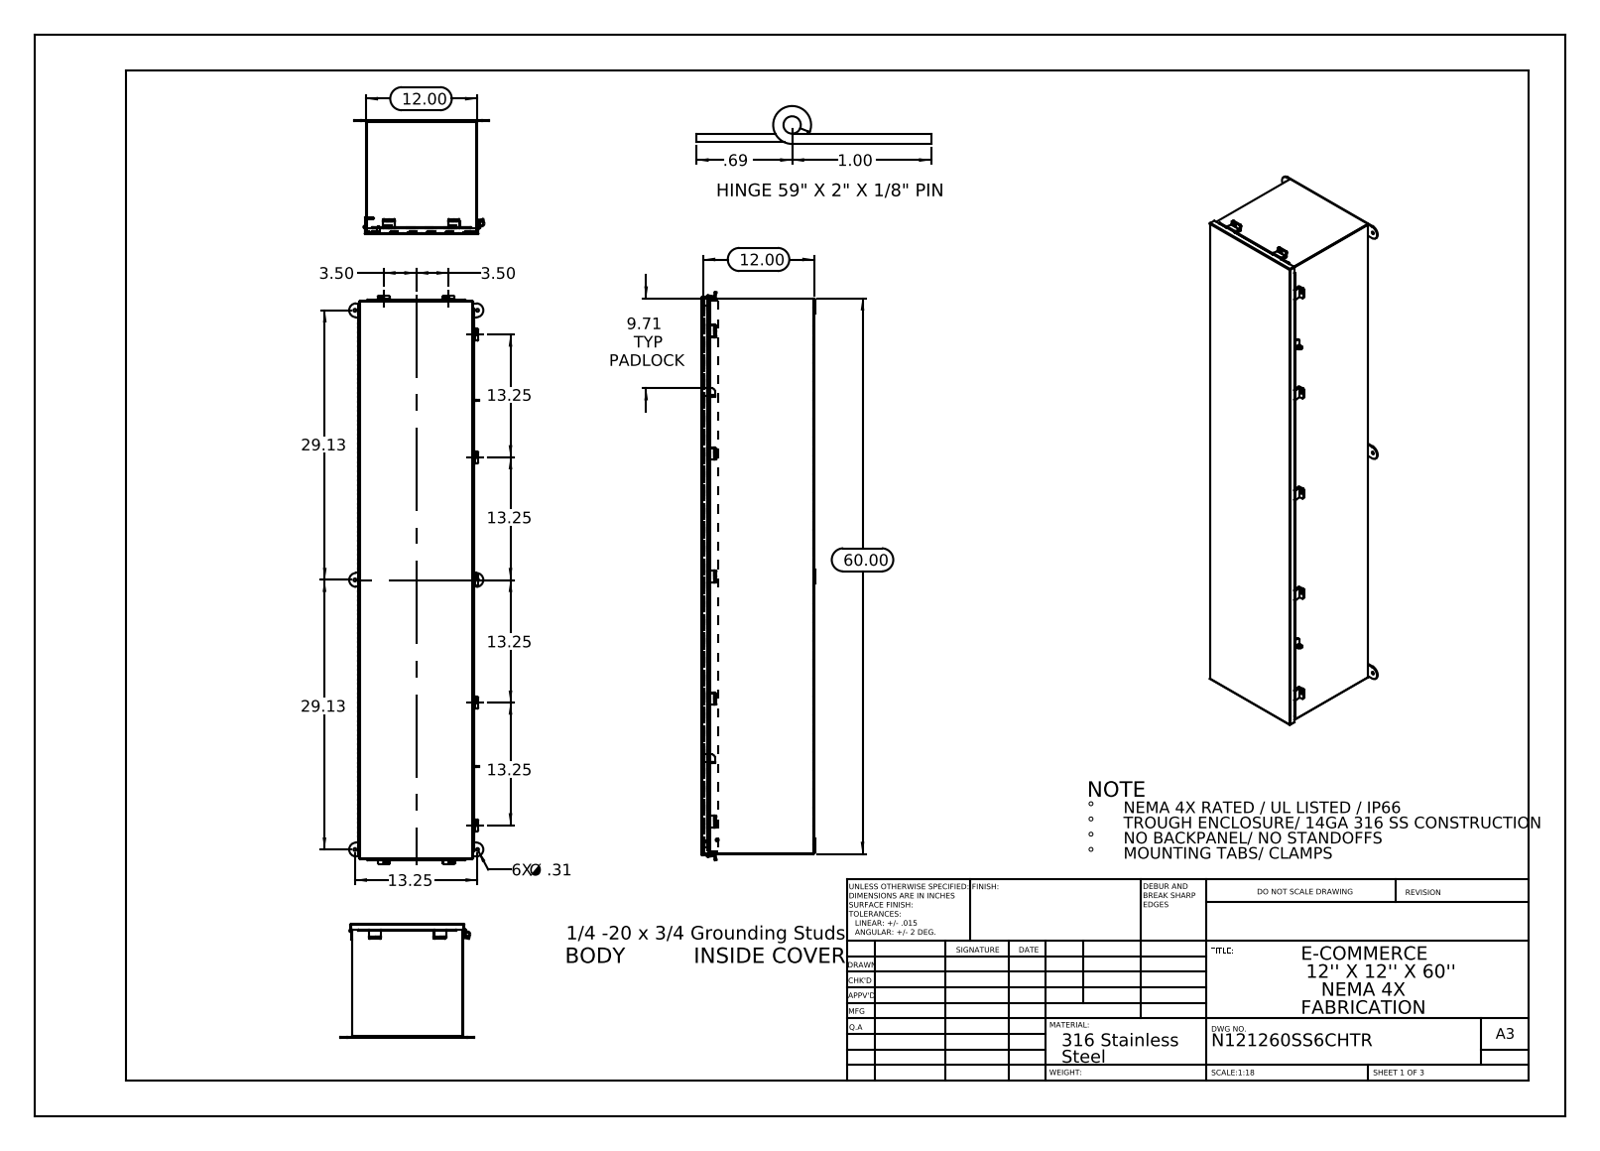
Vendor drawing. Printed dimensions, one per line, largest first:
60.00
29.13
29.13
13.25
13.25
13.25
13.25
13.25
12.00
12.00
9.71 TYP PADLOCK
3.50
3.50
1.00
.69
6X Ø .31
